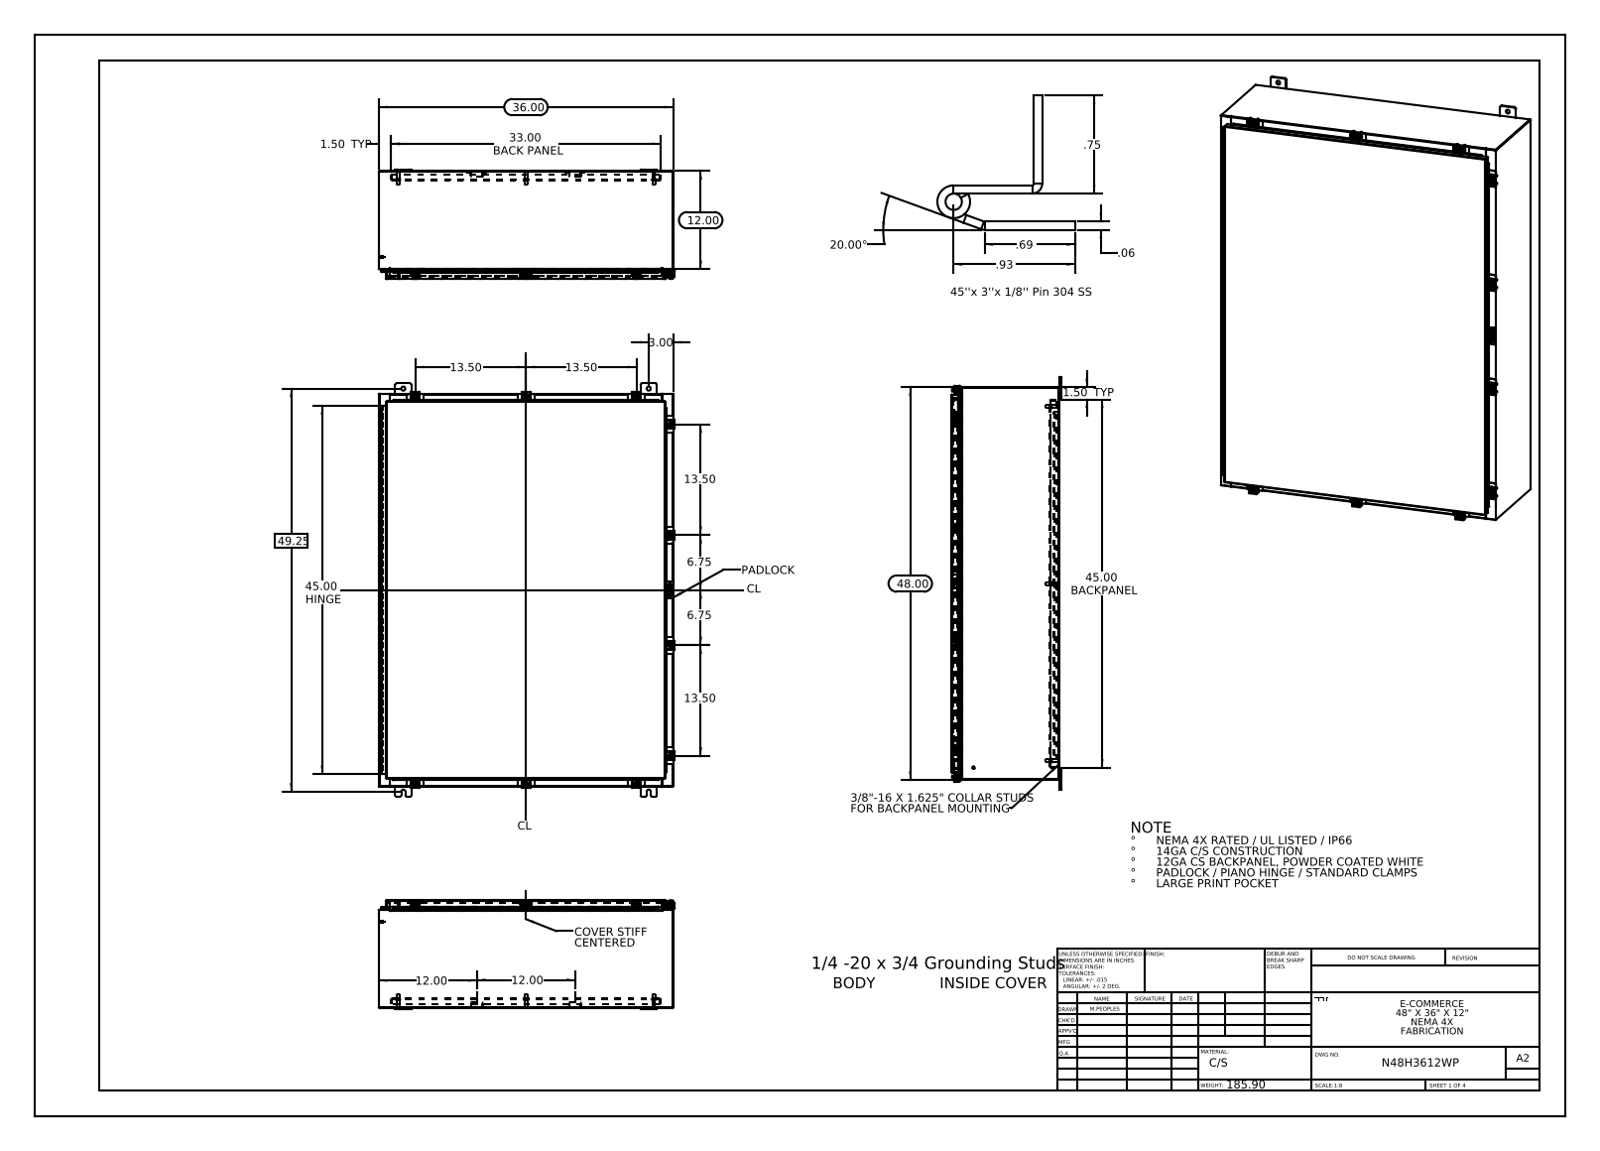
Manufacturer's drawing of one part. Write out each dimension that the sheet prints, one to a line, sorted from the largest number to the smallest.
49.25
48.00
45.00 HINGE
45.00 BACKPANEL
36.00
33.00 BACK PANEL
20.00°
13.50
13.50
13.50
13.50
12.00
12.00
12.00
6.75
6.75
3.00
1.50 TYP
1.50 TYP
.93
.75
.69
.06
